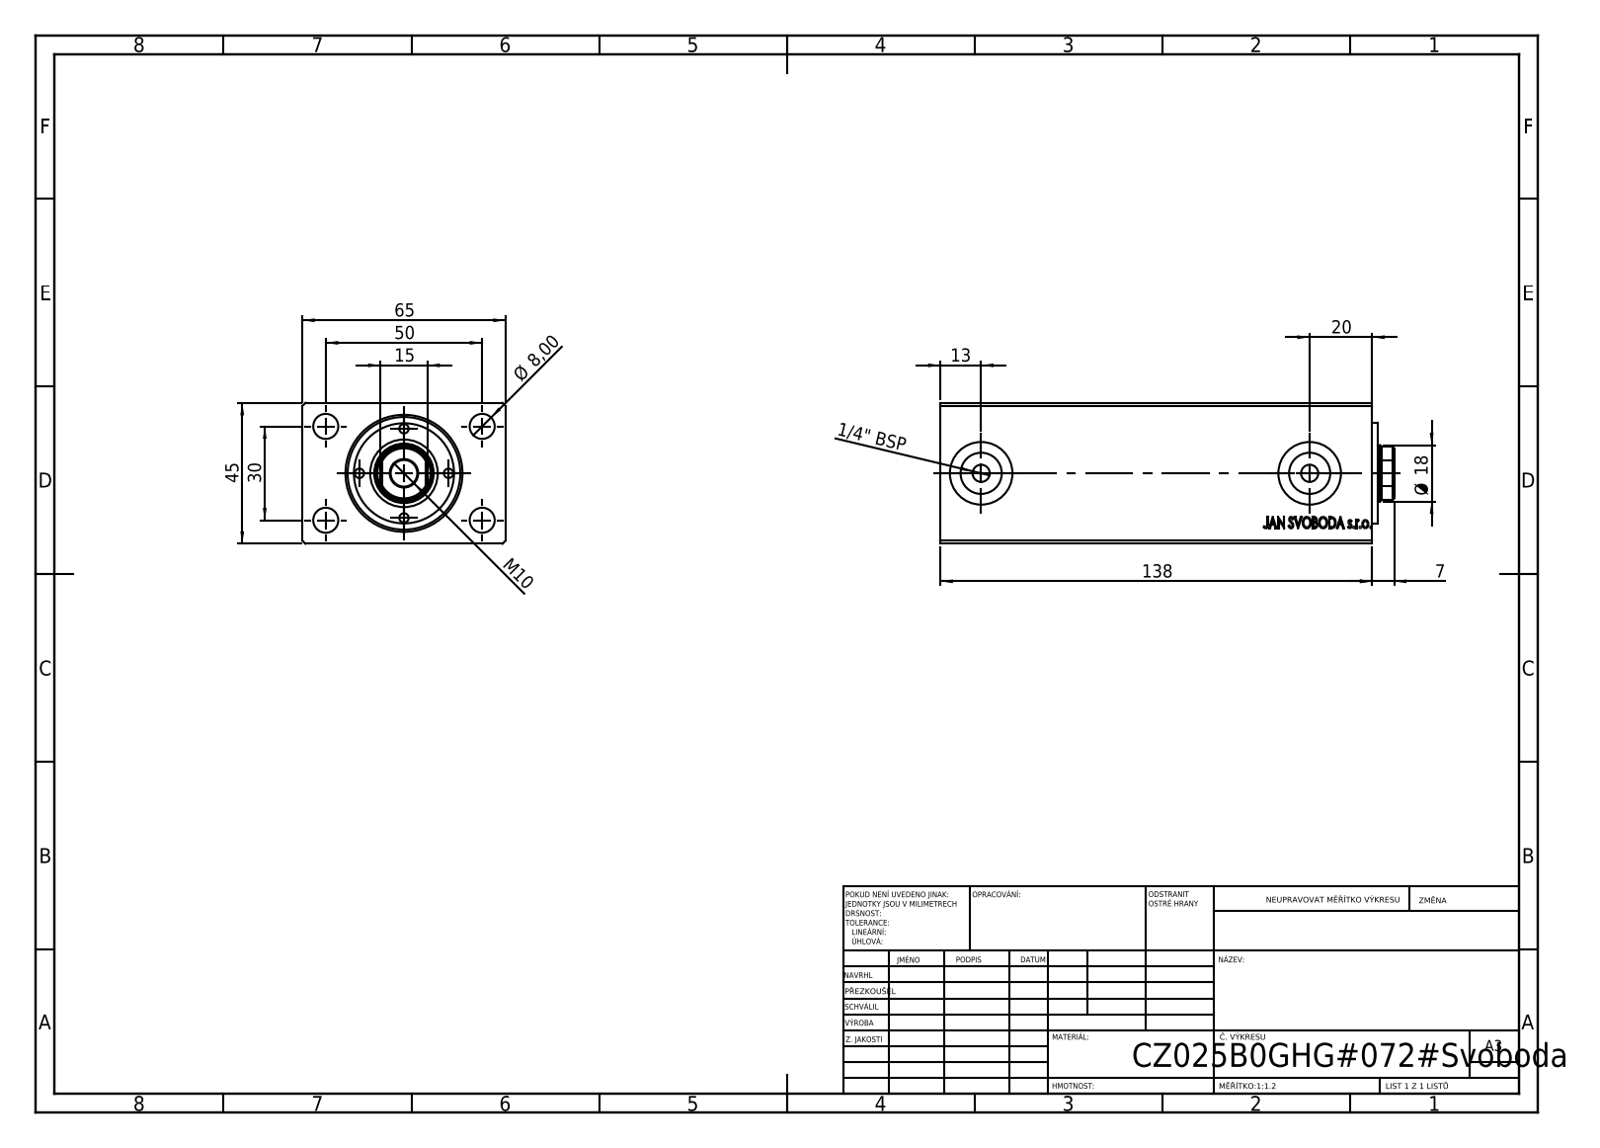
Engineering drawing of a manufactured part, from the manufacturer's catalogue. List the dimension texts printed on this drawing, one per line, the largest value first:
138
65
50
45
30
20
Ø 18
15
13
M10
Ø 8,00
7
1/4" BSP
